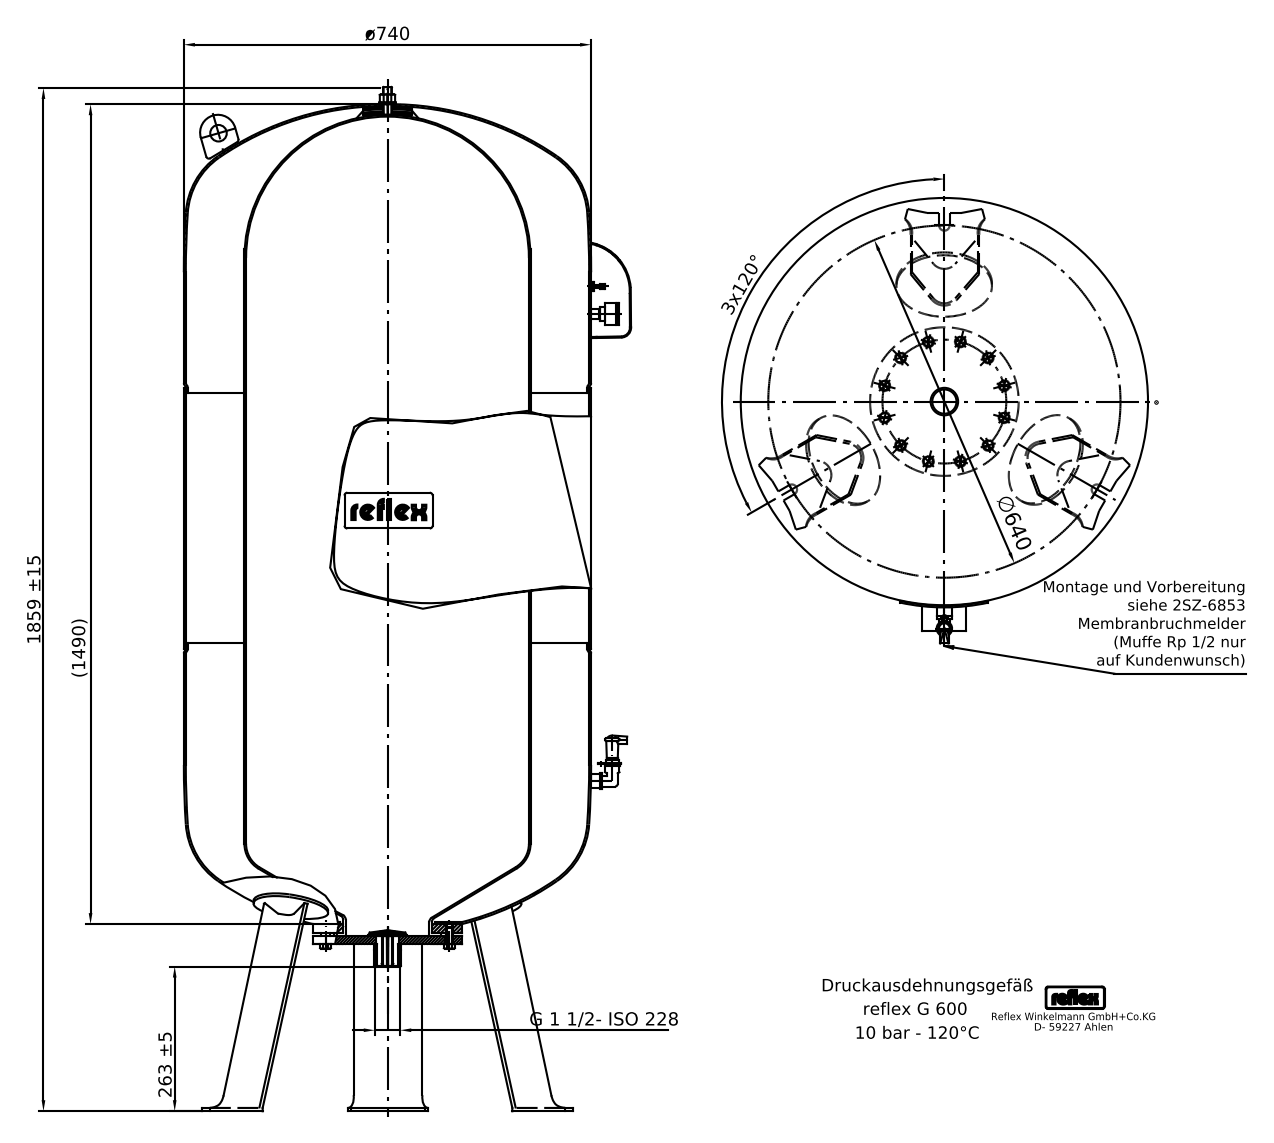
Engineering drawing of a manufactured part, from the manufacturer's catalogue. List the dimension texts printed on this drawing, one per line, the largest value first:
1859 ±15
(1490)
ø740
∅640
263 ±5
3x120°
G 1 1/2- ISO 228
